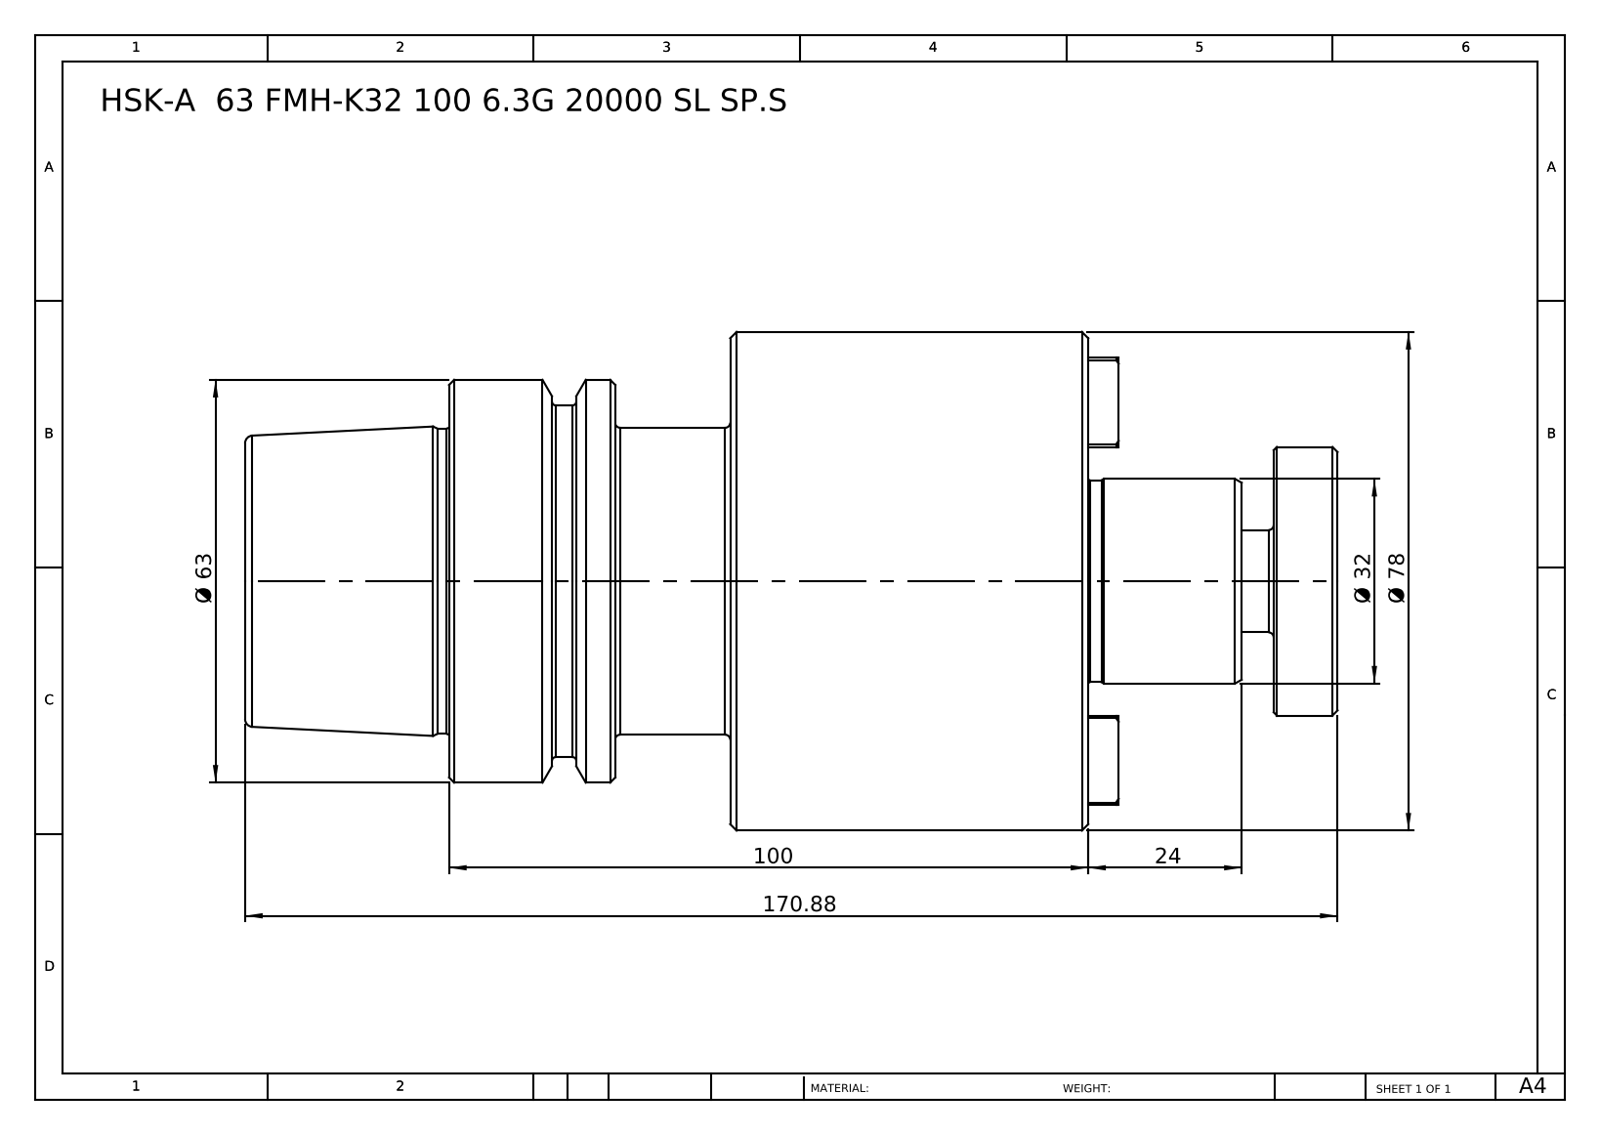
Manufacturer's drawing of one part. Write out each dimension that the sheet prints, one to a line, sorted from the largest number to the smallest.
170.88
100
Ø 78
Ø 63
Ø 32
24
